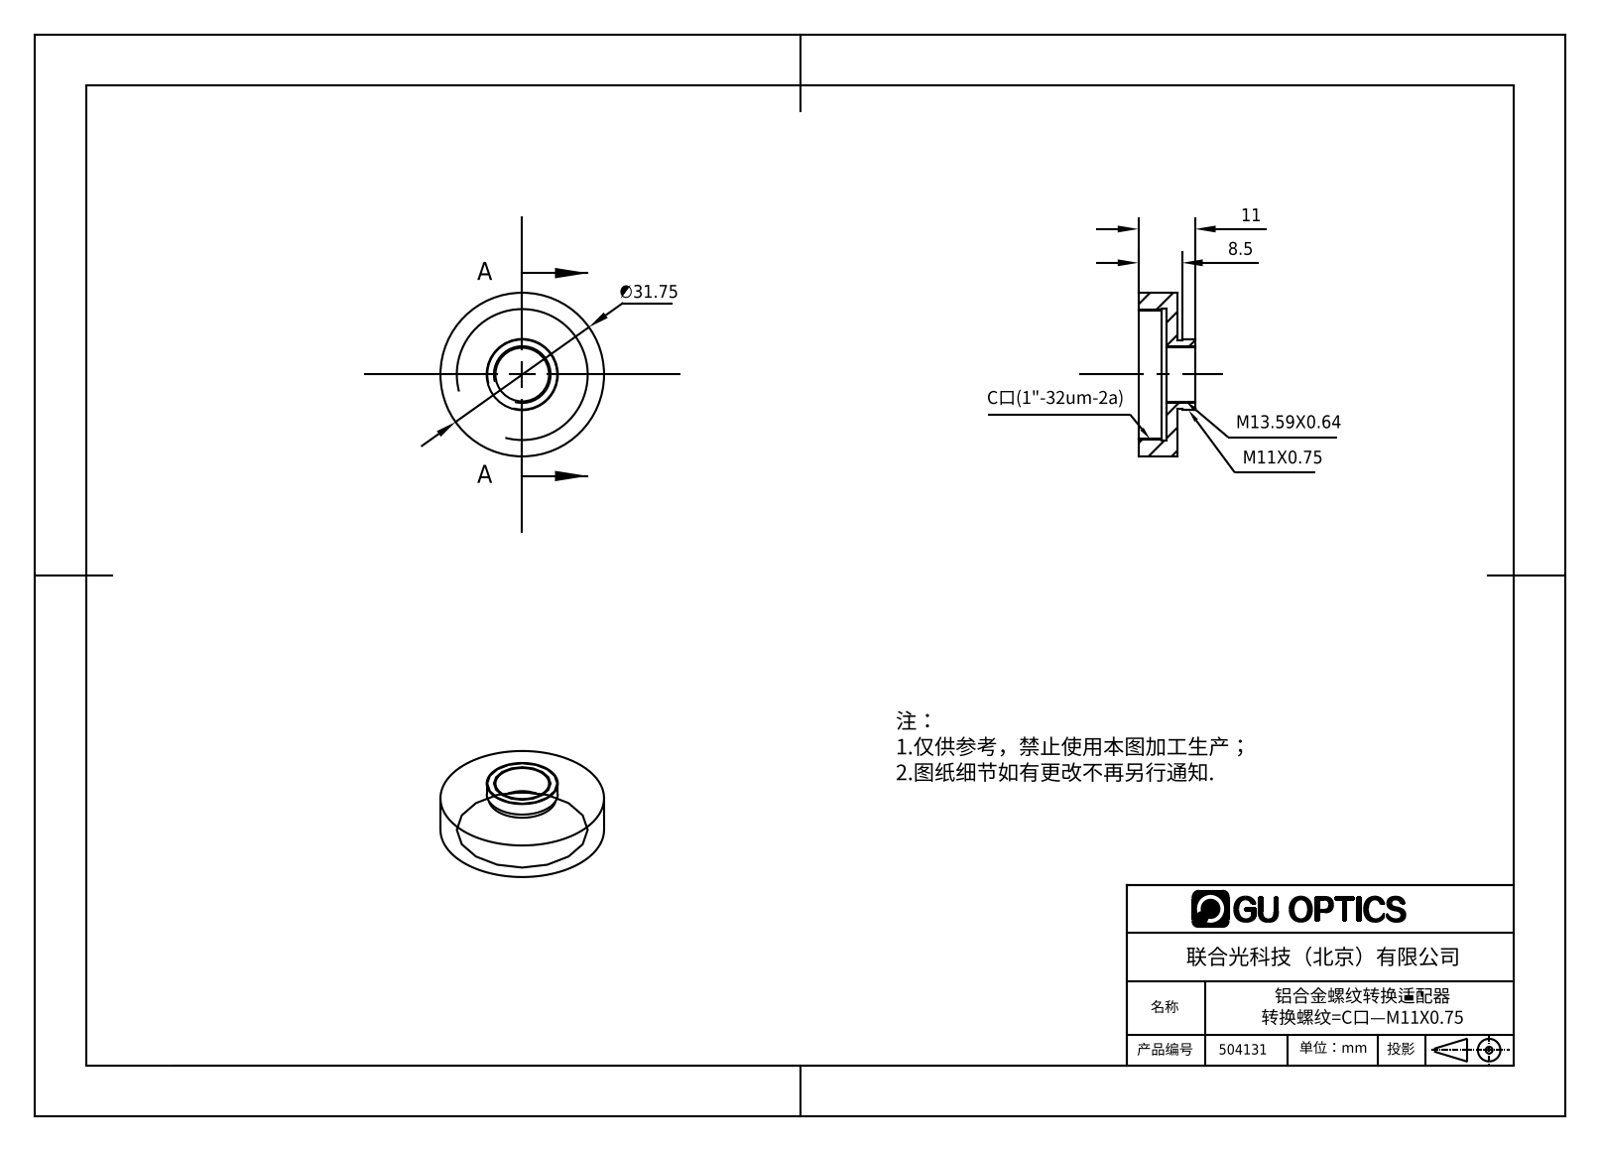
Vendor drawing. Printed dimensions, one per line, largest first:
∅31.75
11
8.5
